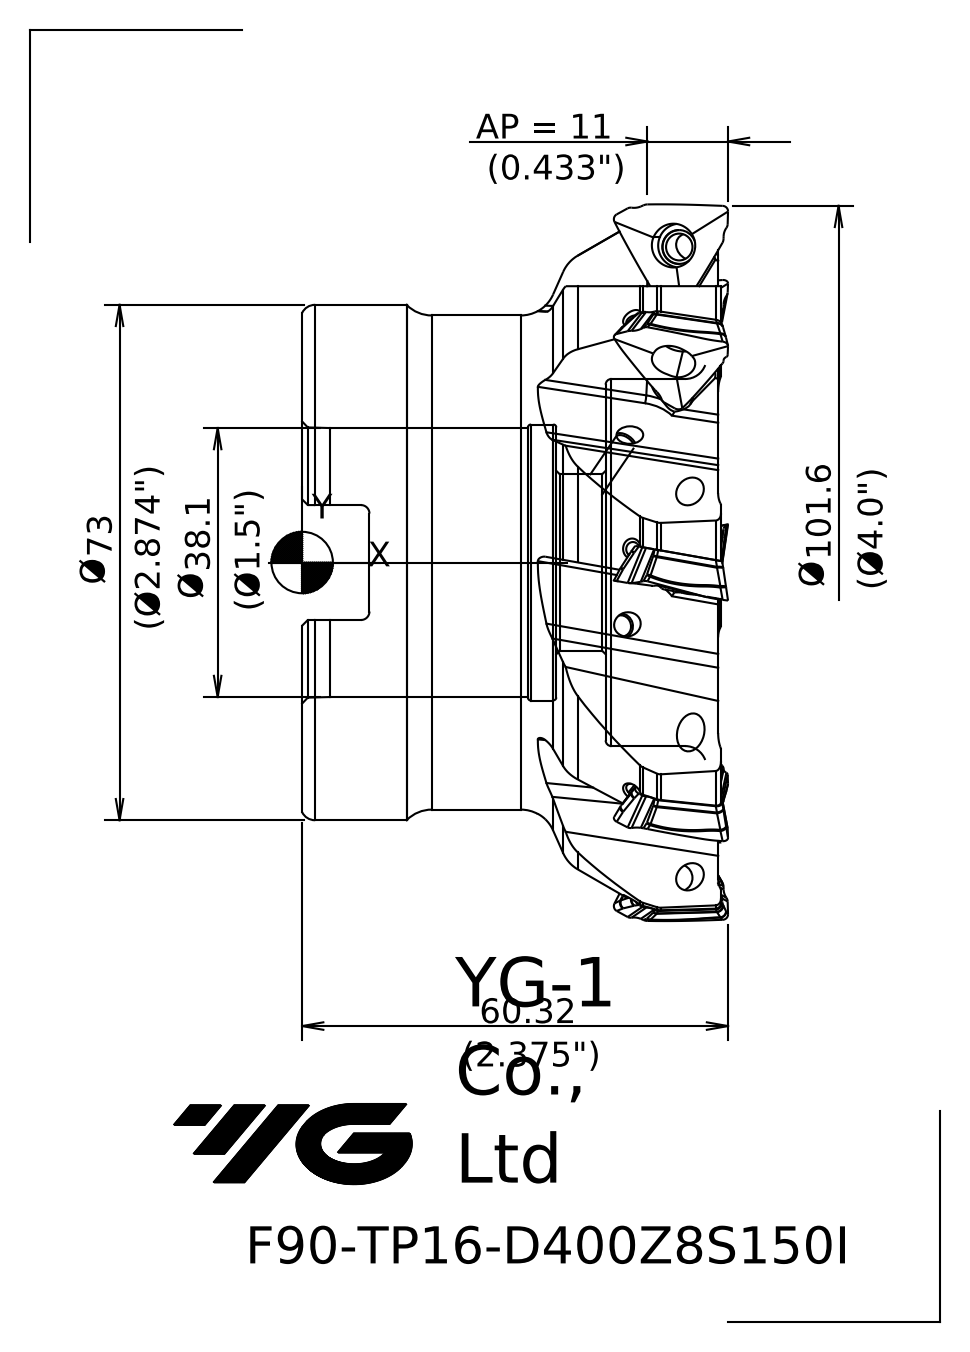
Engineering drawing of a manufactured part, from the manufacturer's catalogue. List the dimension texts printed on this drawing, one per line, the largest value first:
101.6 Ø
60.32
38.1 Ø
AP = 11
